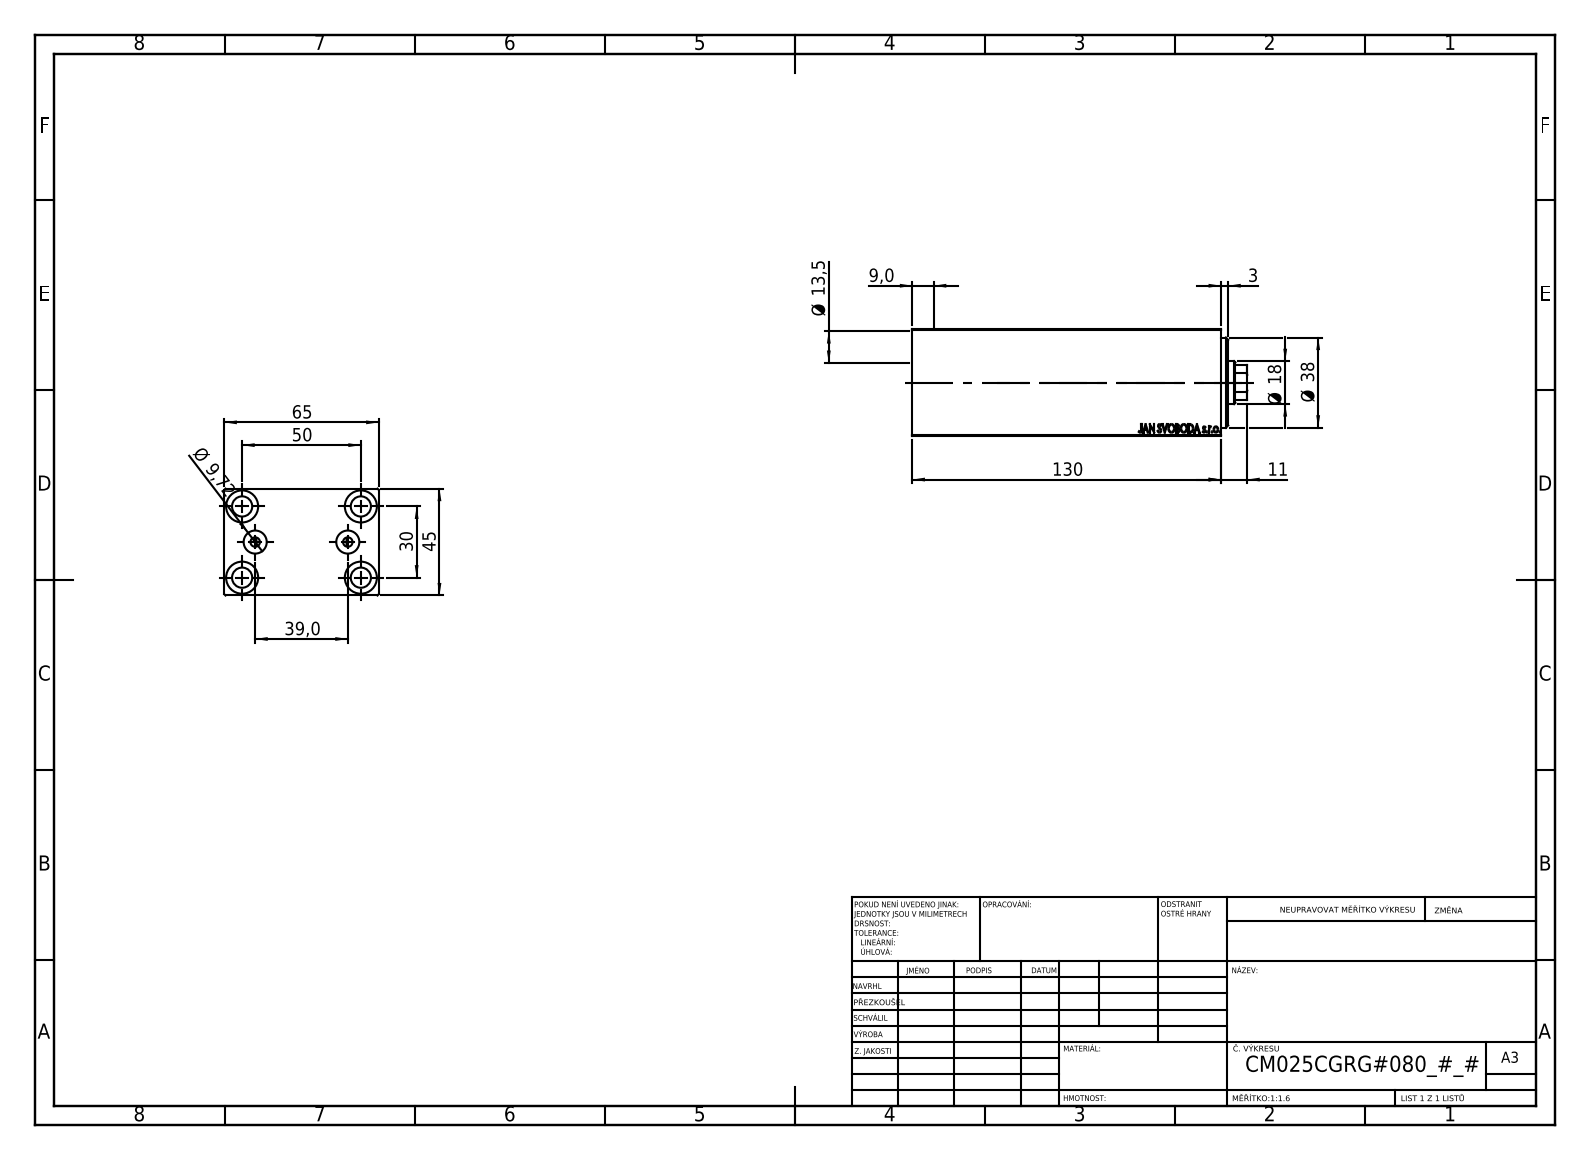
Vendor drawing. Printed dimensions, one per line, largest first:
130
65
50
45
39,0
Ø 38
30
Ø 18
Ø 13,5
11
Ø 9,72
9,0
3
